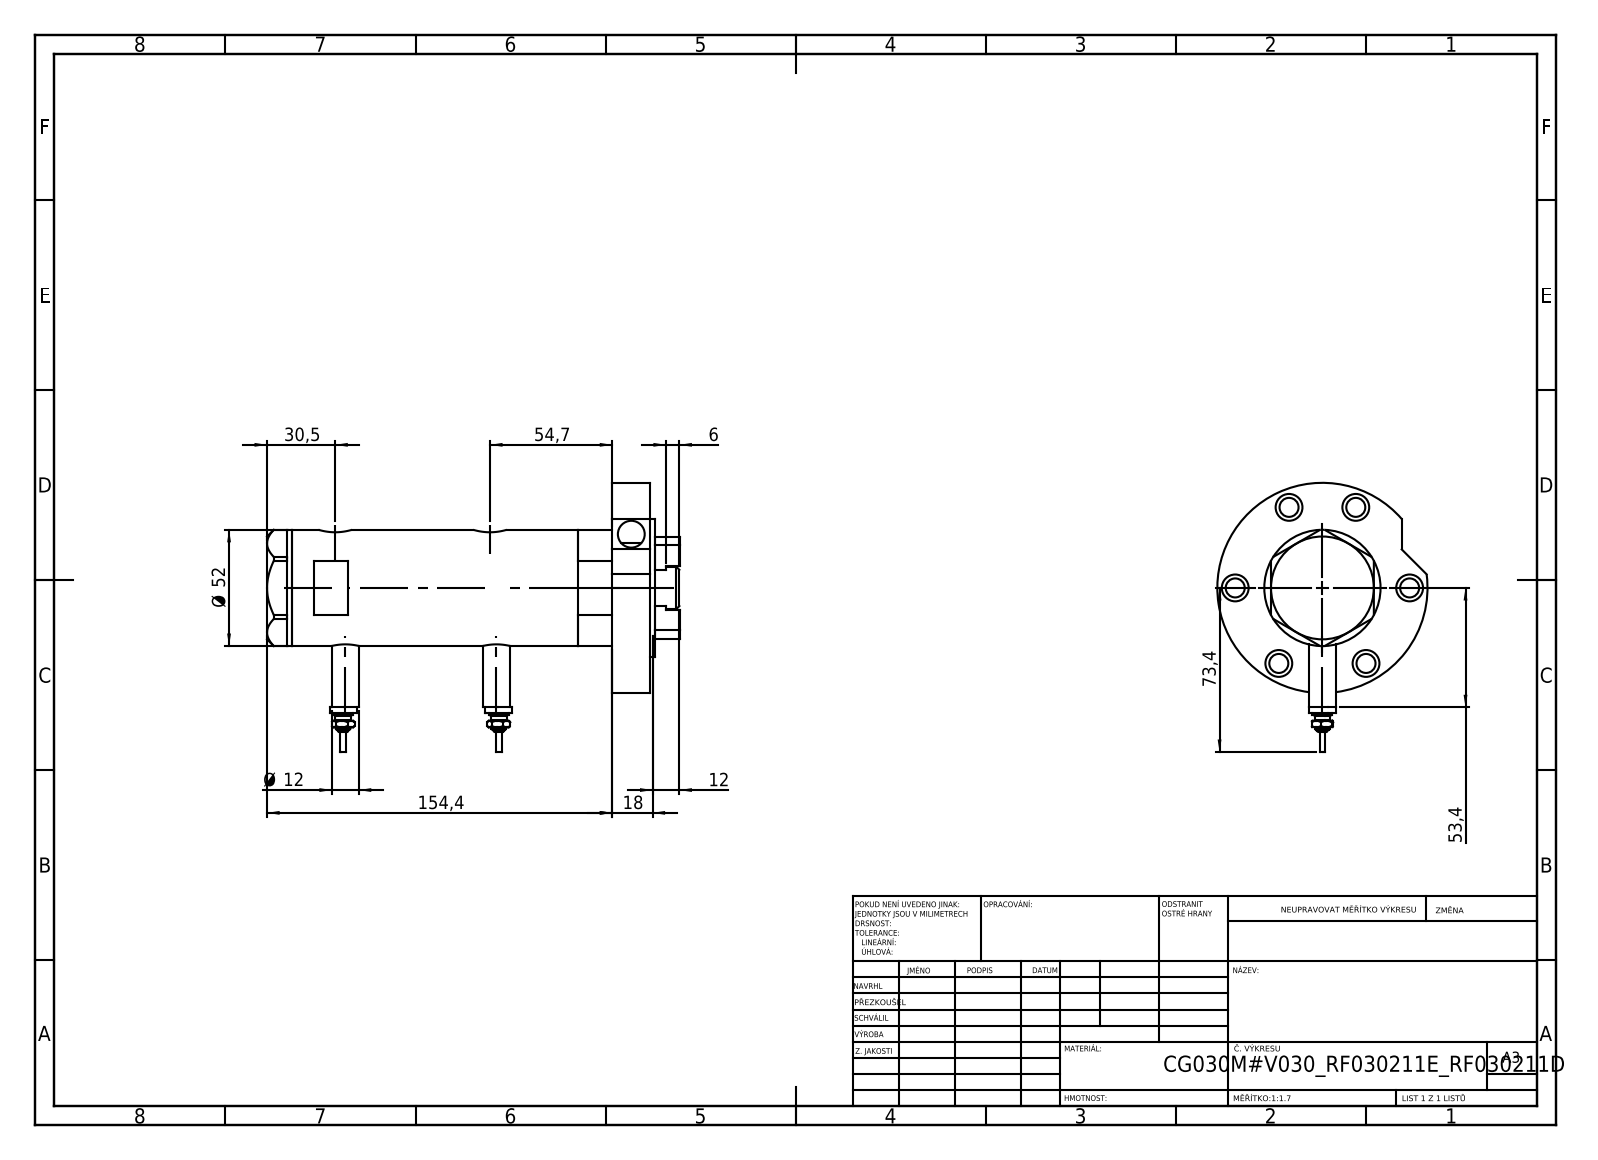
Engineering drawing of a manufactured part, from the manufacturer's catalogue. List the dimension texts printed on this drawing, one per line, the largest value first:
154,4
73,4
54,7
53,4
Ø 52
30,5
18
12
Ø 12
6
